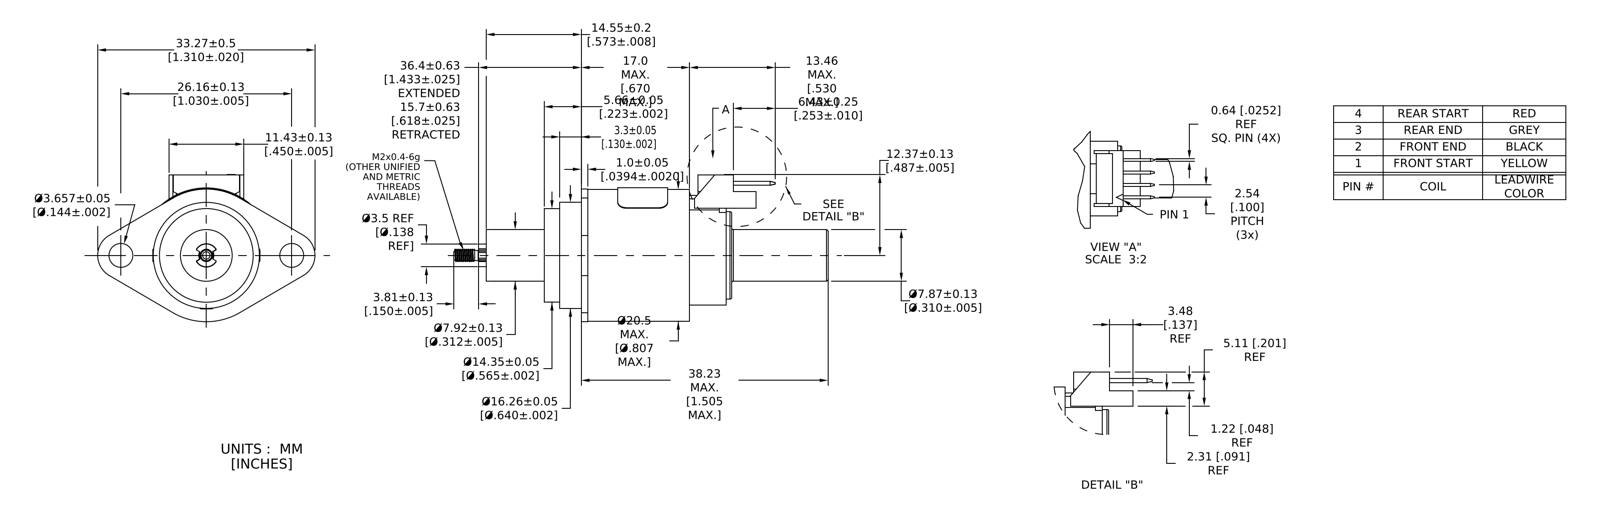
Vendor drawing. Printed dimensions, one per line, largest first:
38.23 MAX. [1.505 MAX.]
36.4±0.63 [1.433±.025] EXTENDED 15.7±0.63 [.618±.025] RETRACTED
33.27±0.5 [1.310±.020]
26.16±0.13 [1.030±.005]
17.0 MAX. [.670 MAX.]
14.55±0.2 [.573±.008]
13.46 MAX. [.530 MAX.]
12.37±0.13 [.487±.005]
11.43±0.13 [.450±.005]
Ø7.87±0.13 [Ø.310±.005]
6.43±0.25 [.253±.010]
5.66±0.05 [.223±.002]
5.11 [.201] REF
3.81±0.13 [.150±.005]
Ø3.5 REF [Ø.138 REF]
3.48 [.137] REF
3.3±0.05 [.130±.002]
2.54 [.100] PITCH (3x)
2.31 [.091] REF
1.22 [.048] REF
1.0±0.05 [.0394±.0020]
0.64 [.0252] REF SQ. PIN (4X)
